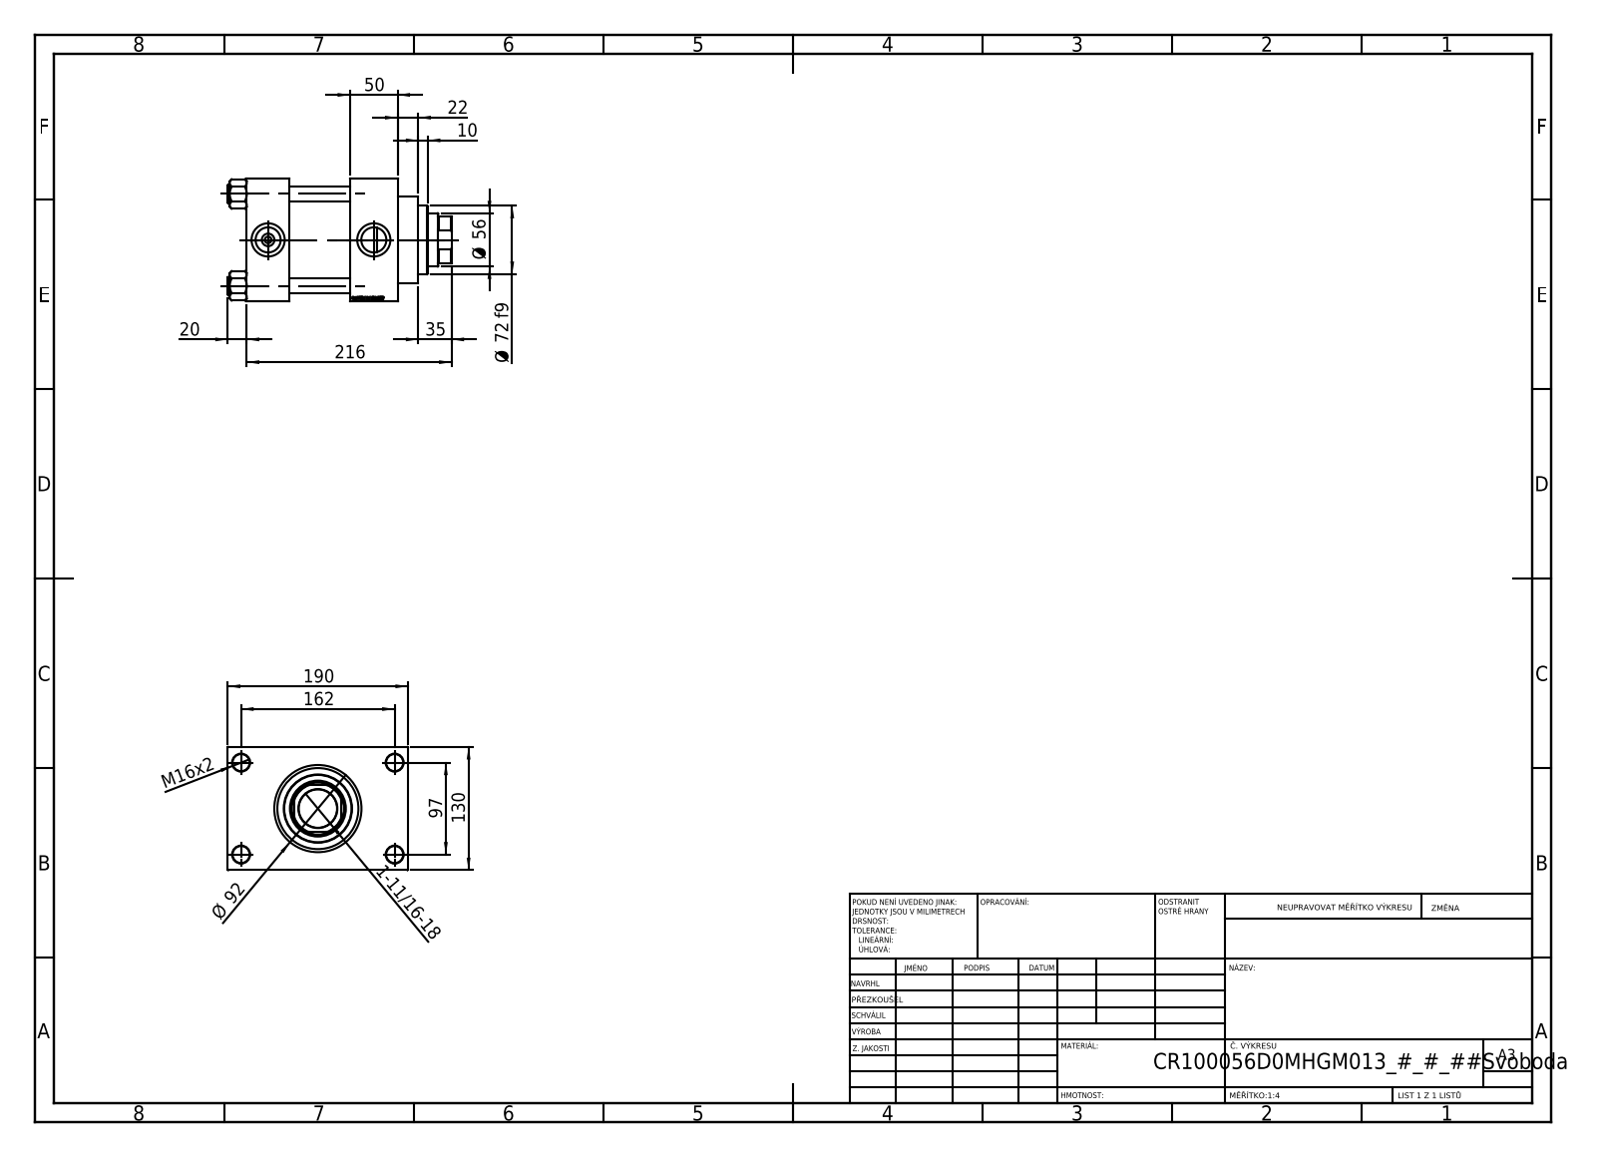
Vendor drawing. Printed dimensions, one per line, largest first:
216
190
162
130
97
Ø 92
Ø 72 f9
Ø 56
50
35
22
20
M16x2
10
1-11/16-18
